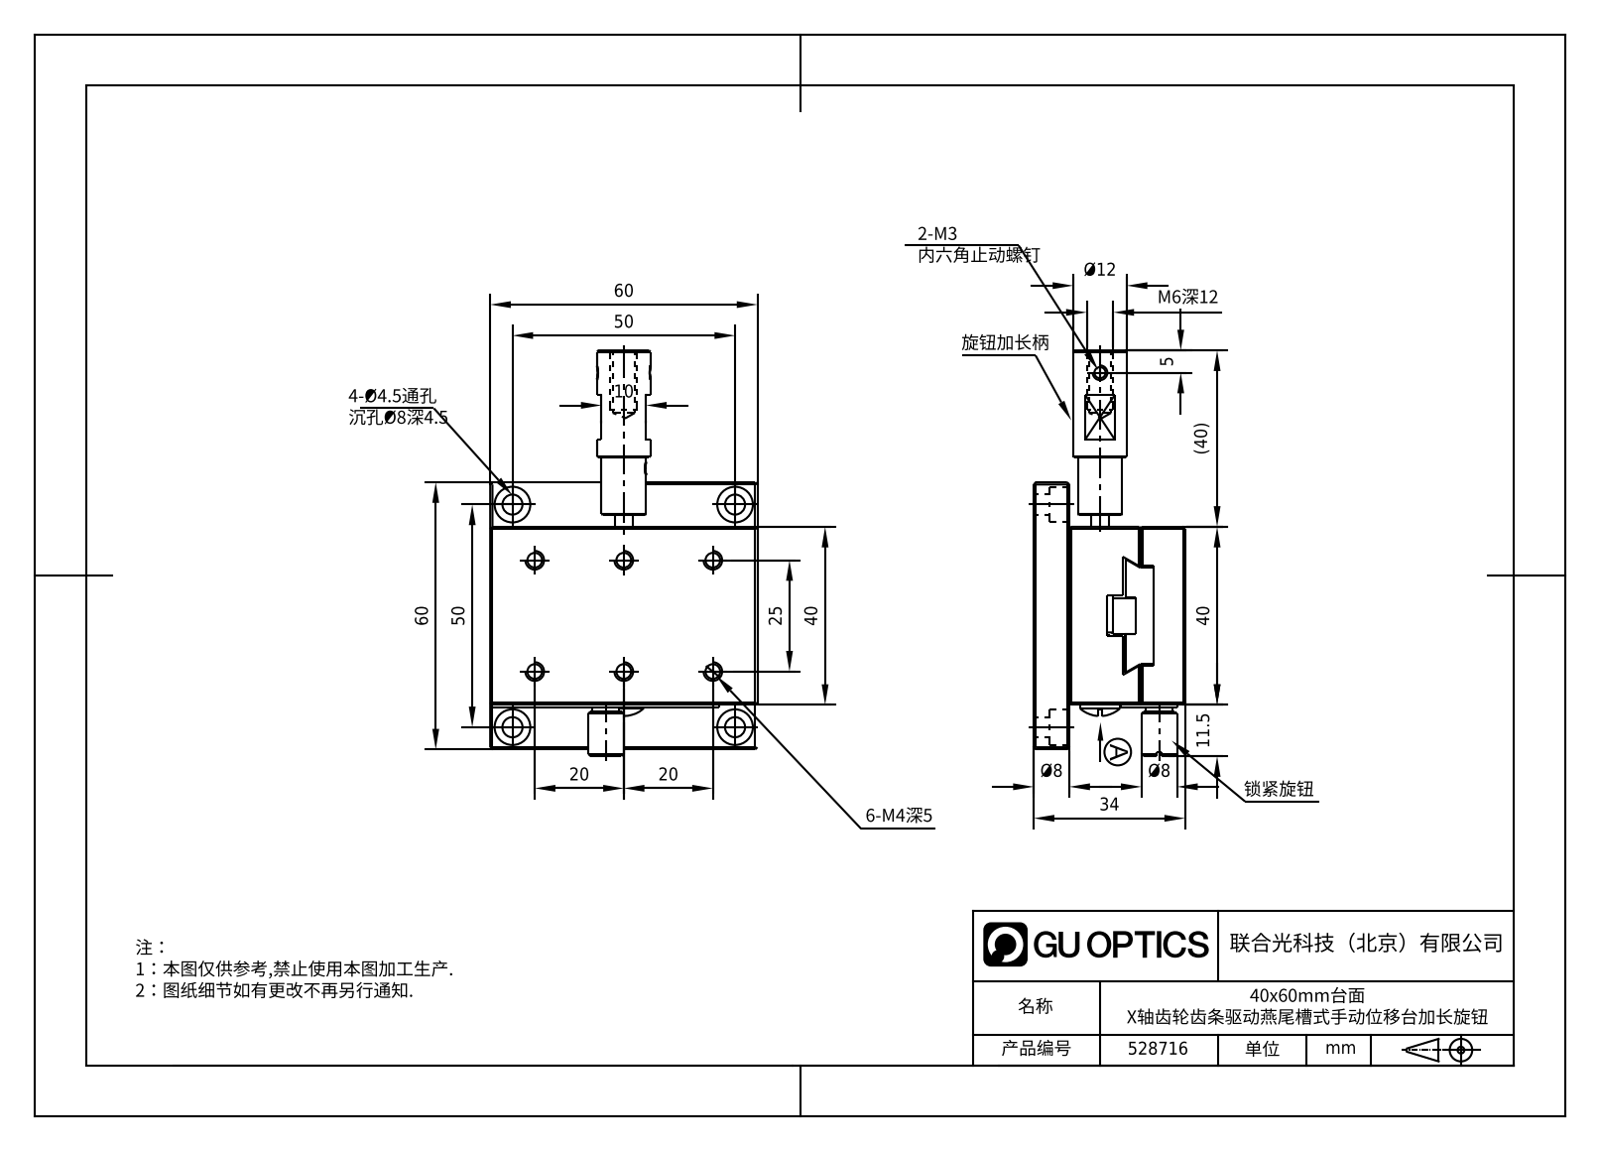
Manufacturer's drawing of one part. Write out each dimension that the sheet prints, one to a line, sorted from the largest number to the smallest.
60
60
50
50
40
(40)
40
34
25
20
20
Ø12
11.5
10
Ø8
Ø8
M6深12
5
